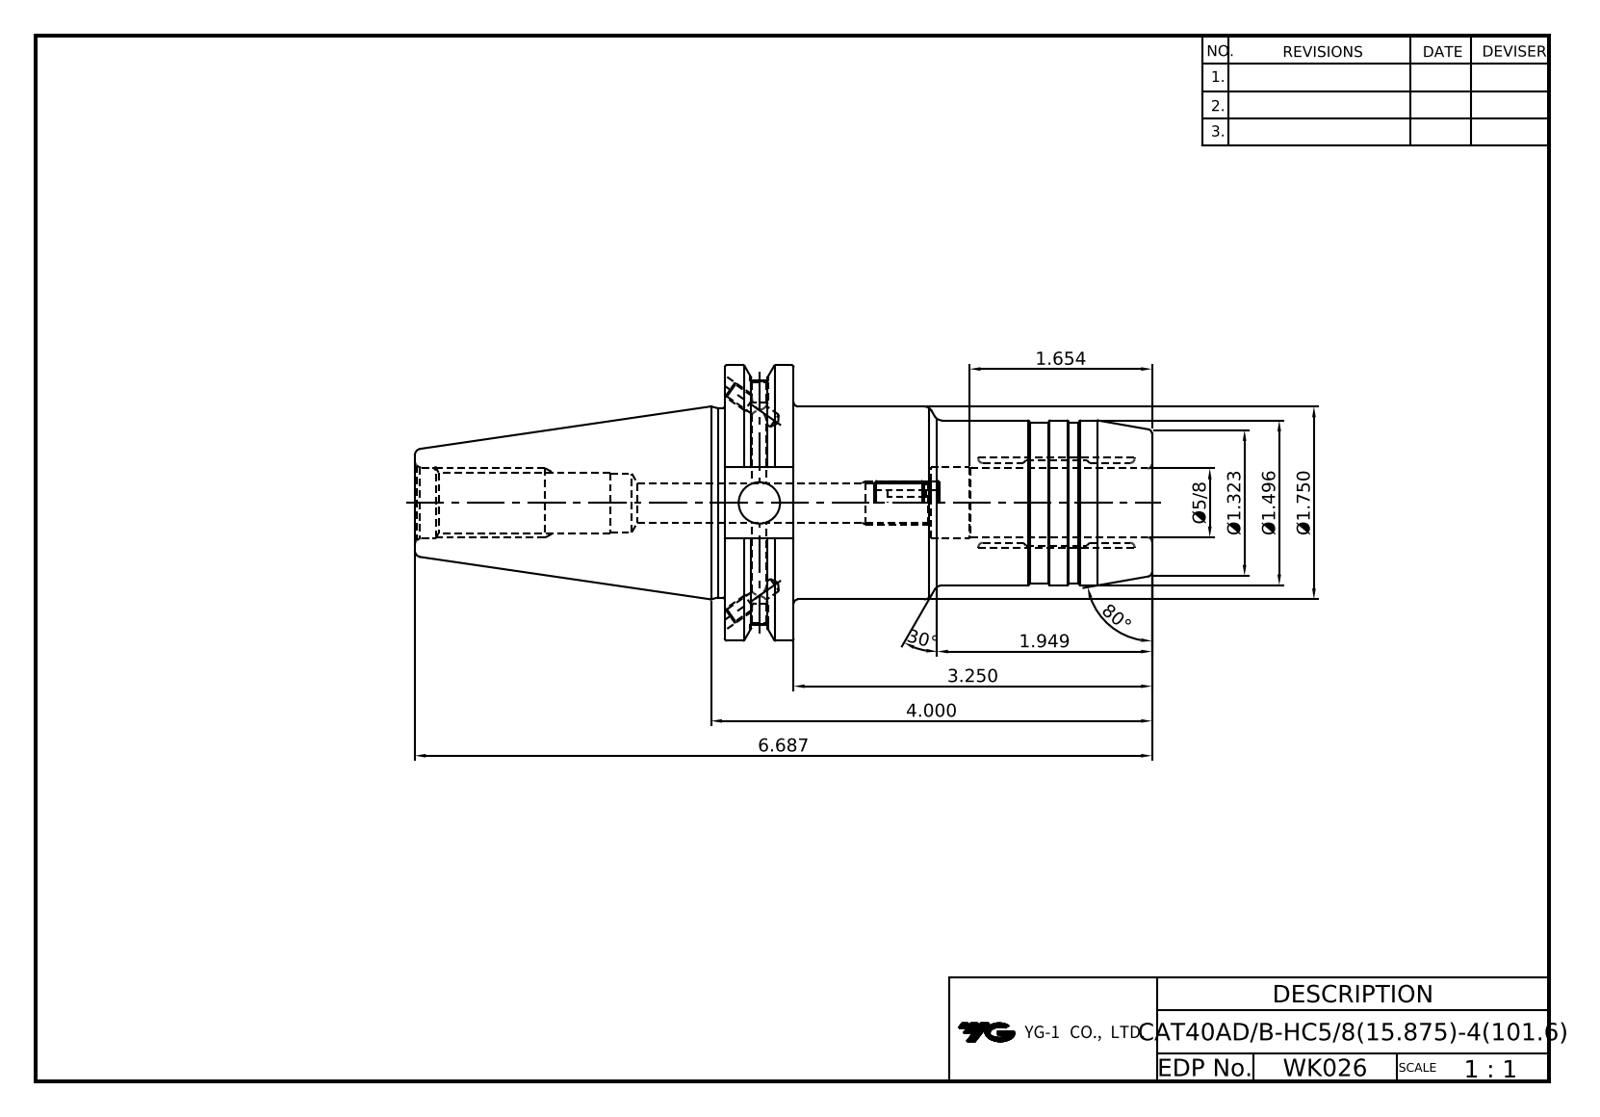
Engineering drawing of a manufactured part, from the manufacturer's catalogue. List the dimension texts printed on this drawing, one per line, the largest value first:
80°
30°
6.687
4.000
3.250
1.949
Ø1.750
1.654
Ø1.496
Ø1.323
Ø5/8
